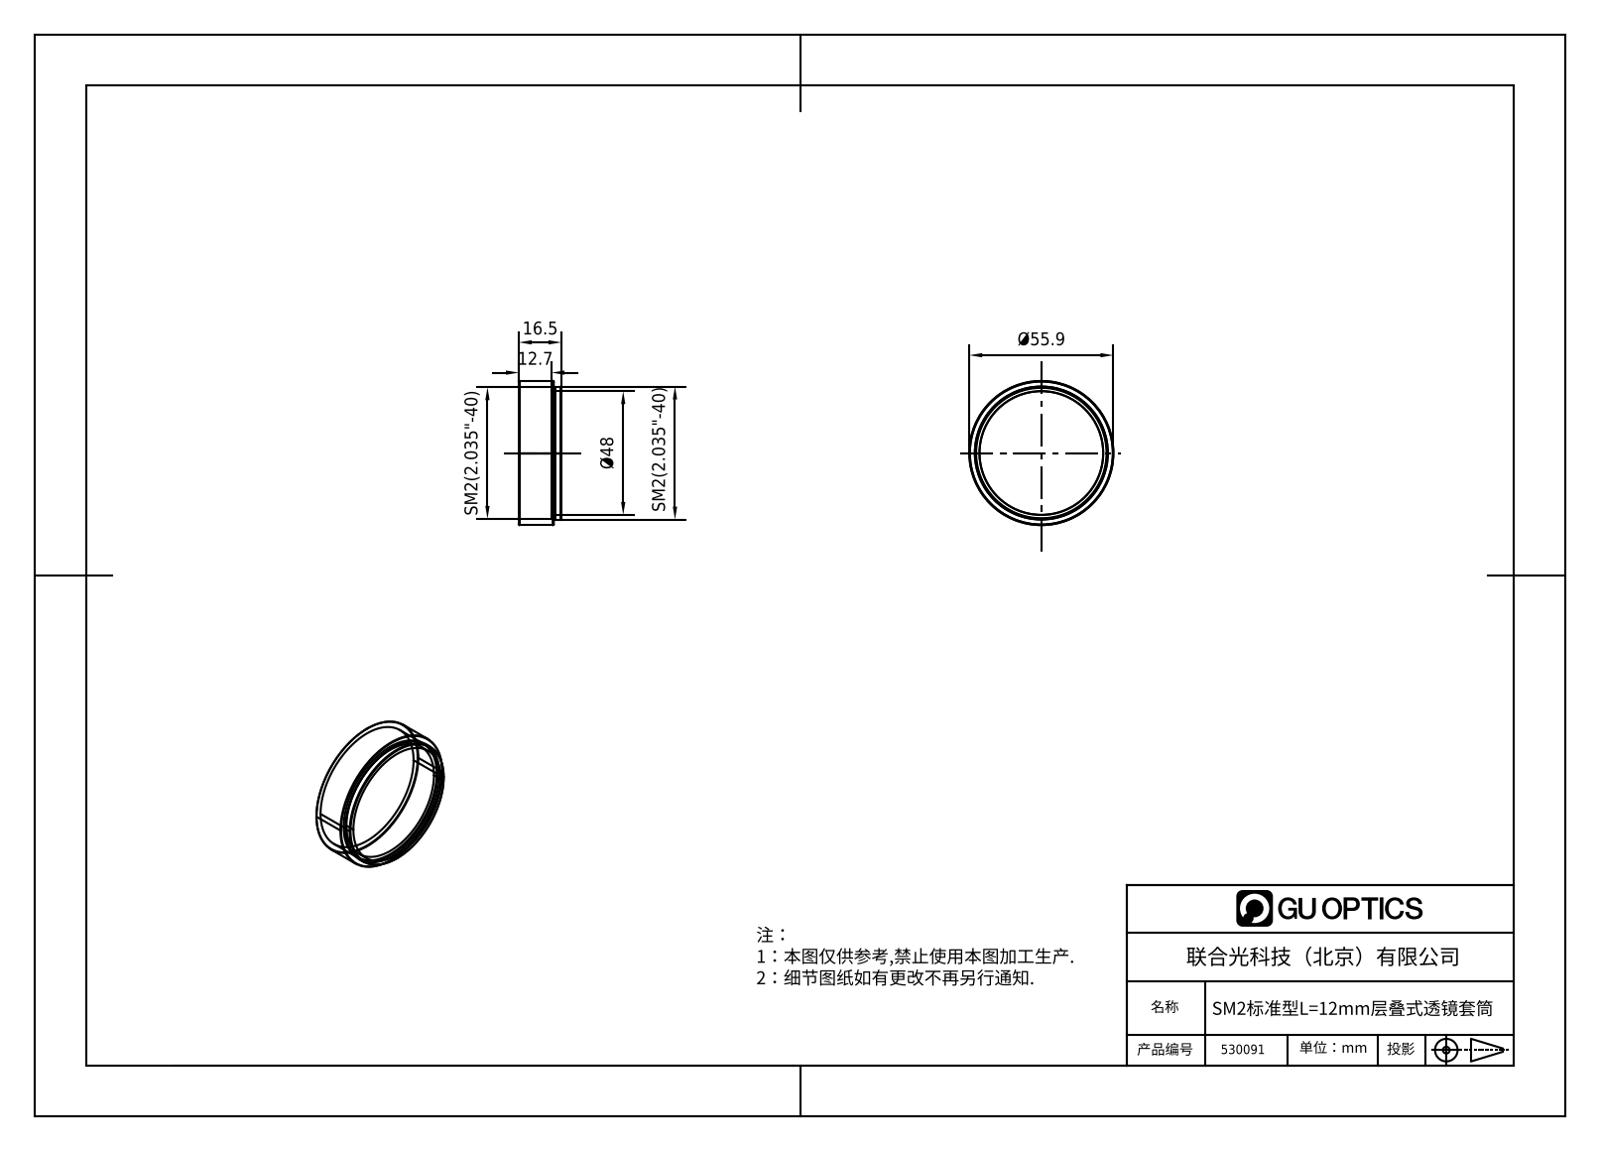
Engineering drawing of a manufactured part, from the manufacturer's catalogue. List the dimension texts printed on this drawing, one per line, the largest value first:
Ø55.9
Ø48
16.5
12.7
SM2(2.035"-40)
SM2(2.035"-40)
